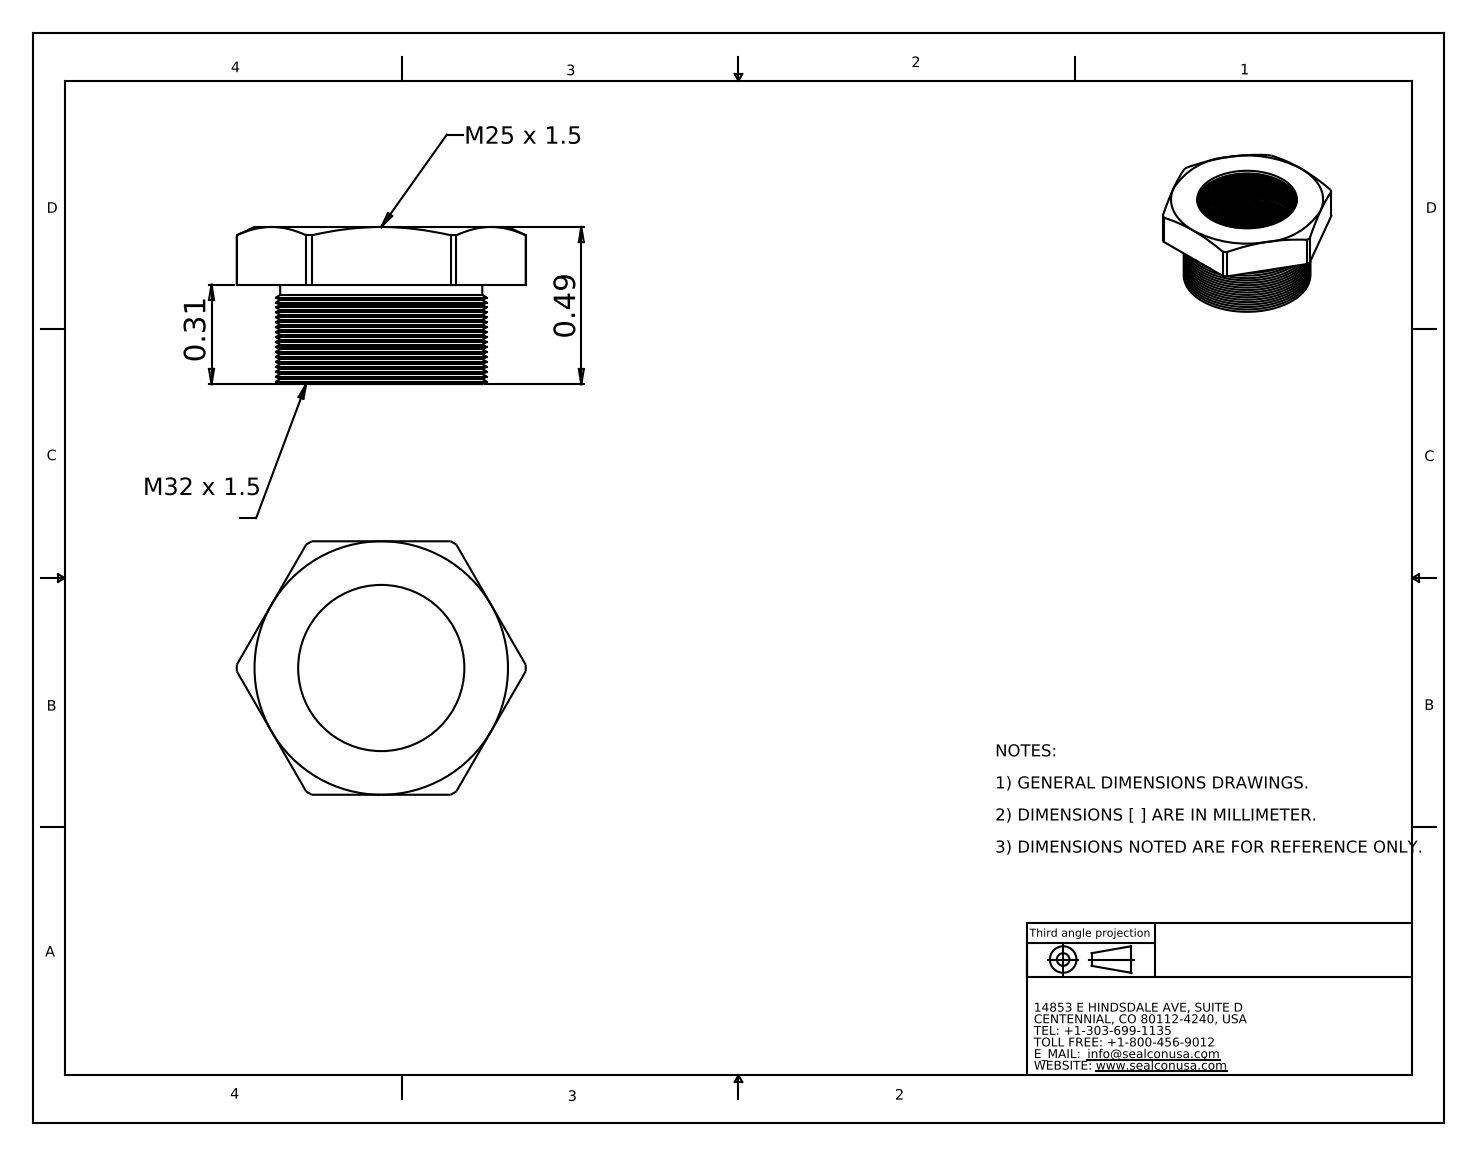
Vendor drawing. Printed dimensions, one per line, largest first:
0.49
0.31
